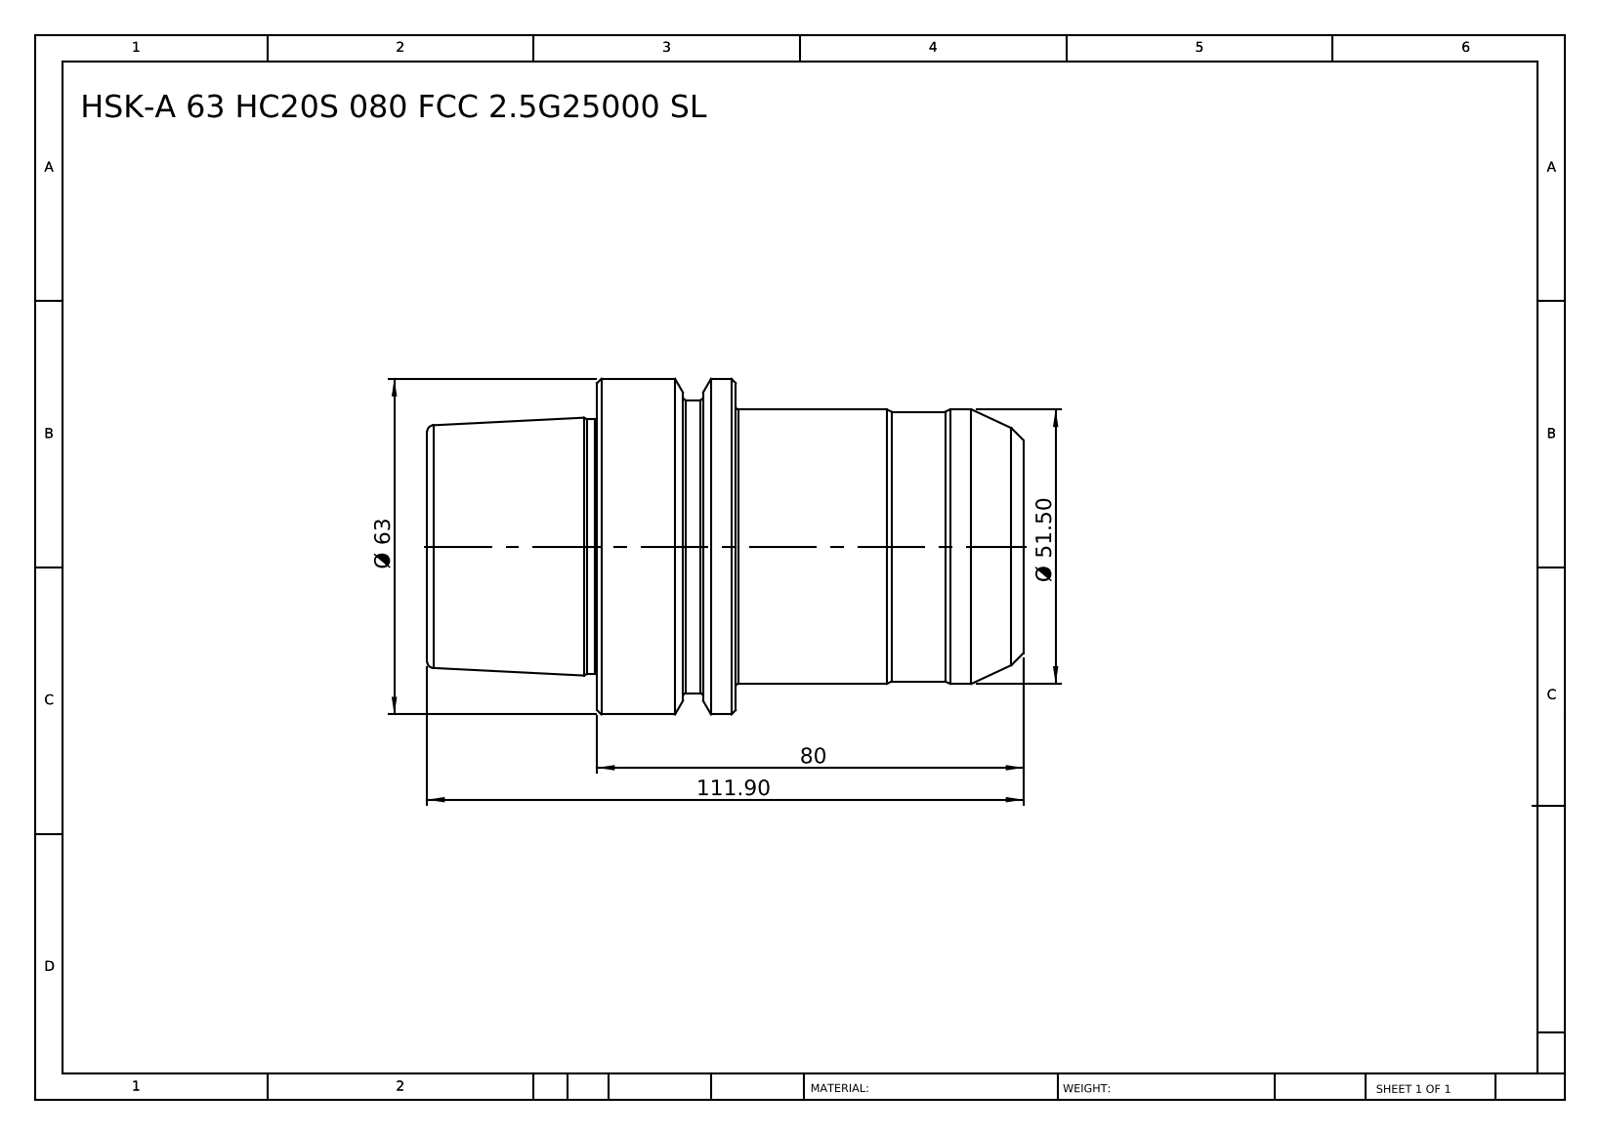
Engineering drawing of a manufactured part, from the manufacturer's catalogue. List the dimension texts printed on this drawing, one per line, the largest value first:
111.90
80
Ø 63
Ø 51.50
